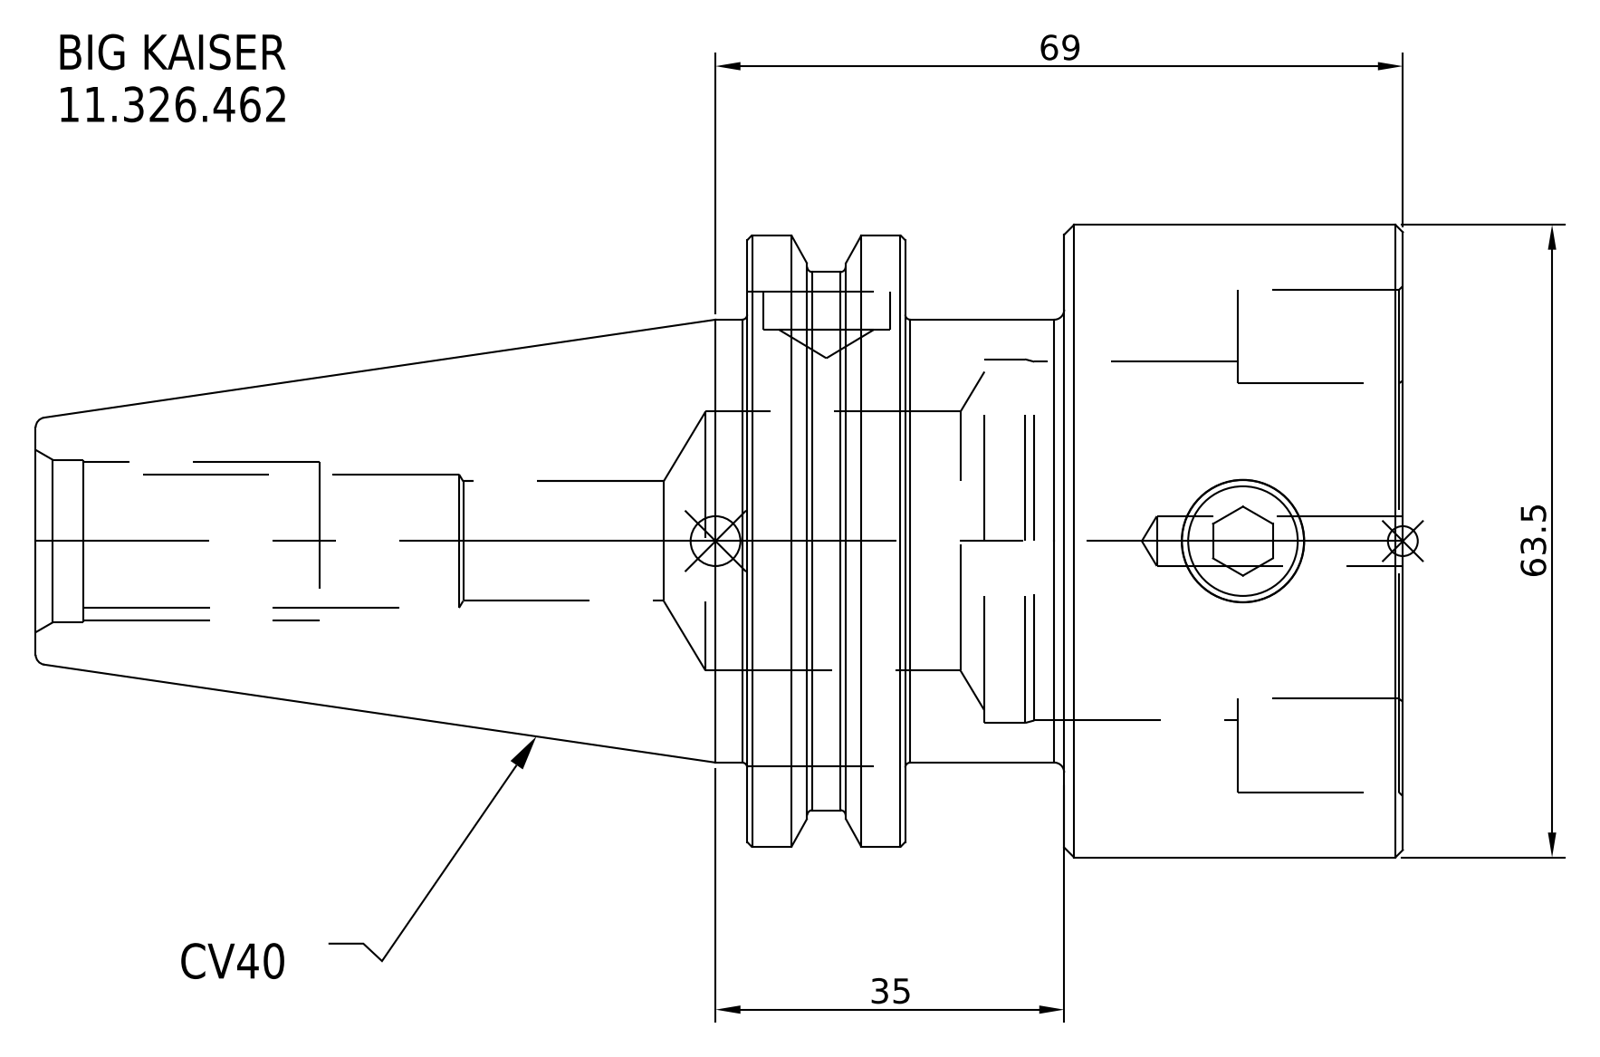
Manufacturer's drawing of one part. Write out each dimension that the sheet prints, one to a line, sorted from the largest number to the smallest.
69
63.5
35
